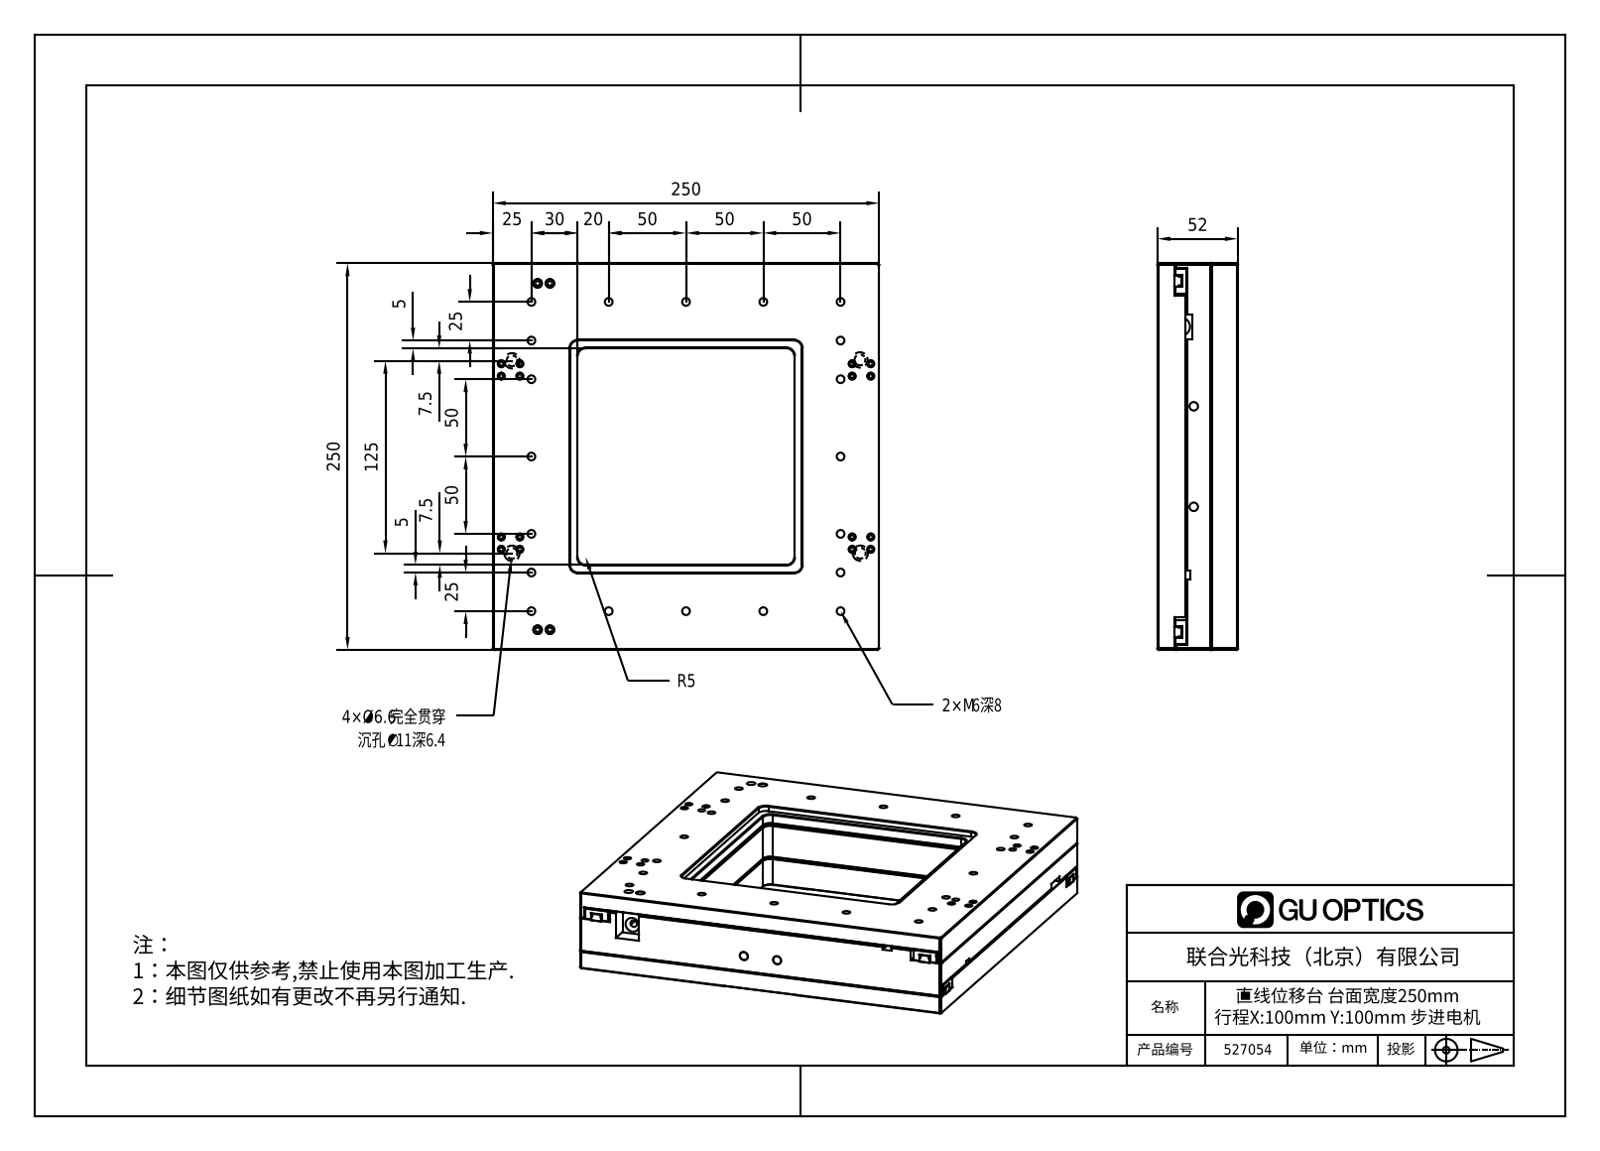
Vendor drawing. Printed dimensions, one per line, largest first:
250
250
125
52
50
50
50
50
50
30
25
25
25
20
7.5
7.5
5
5
